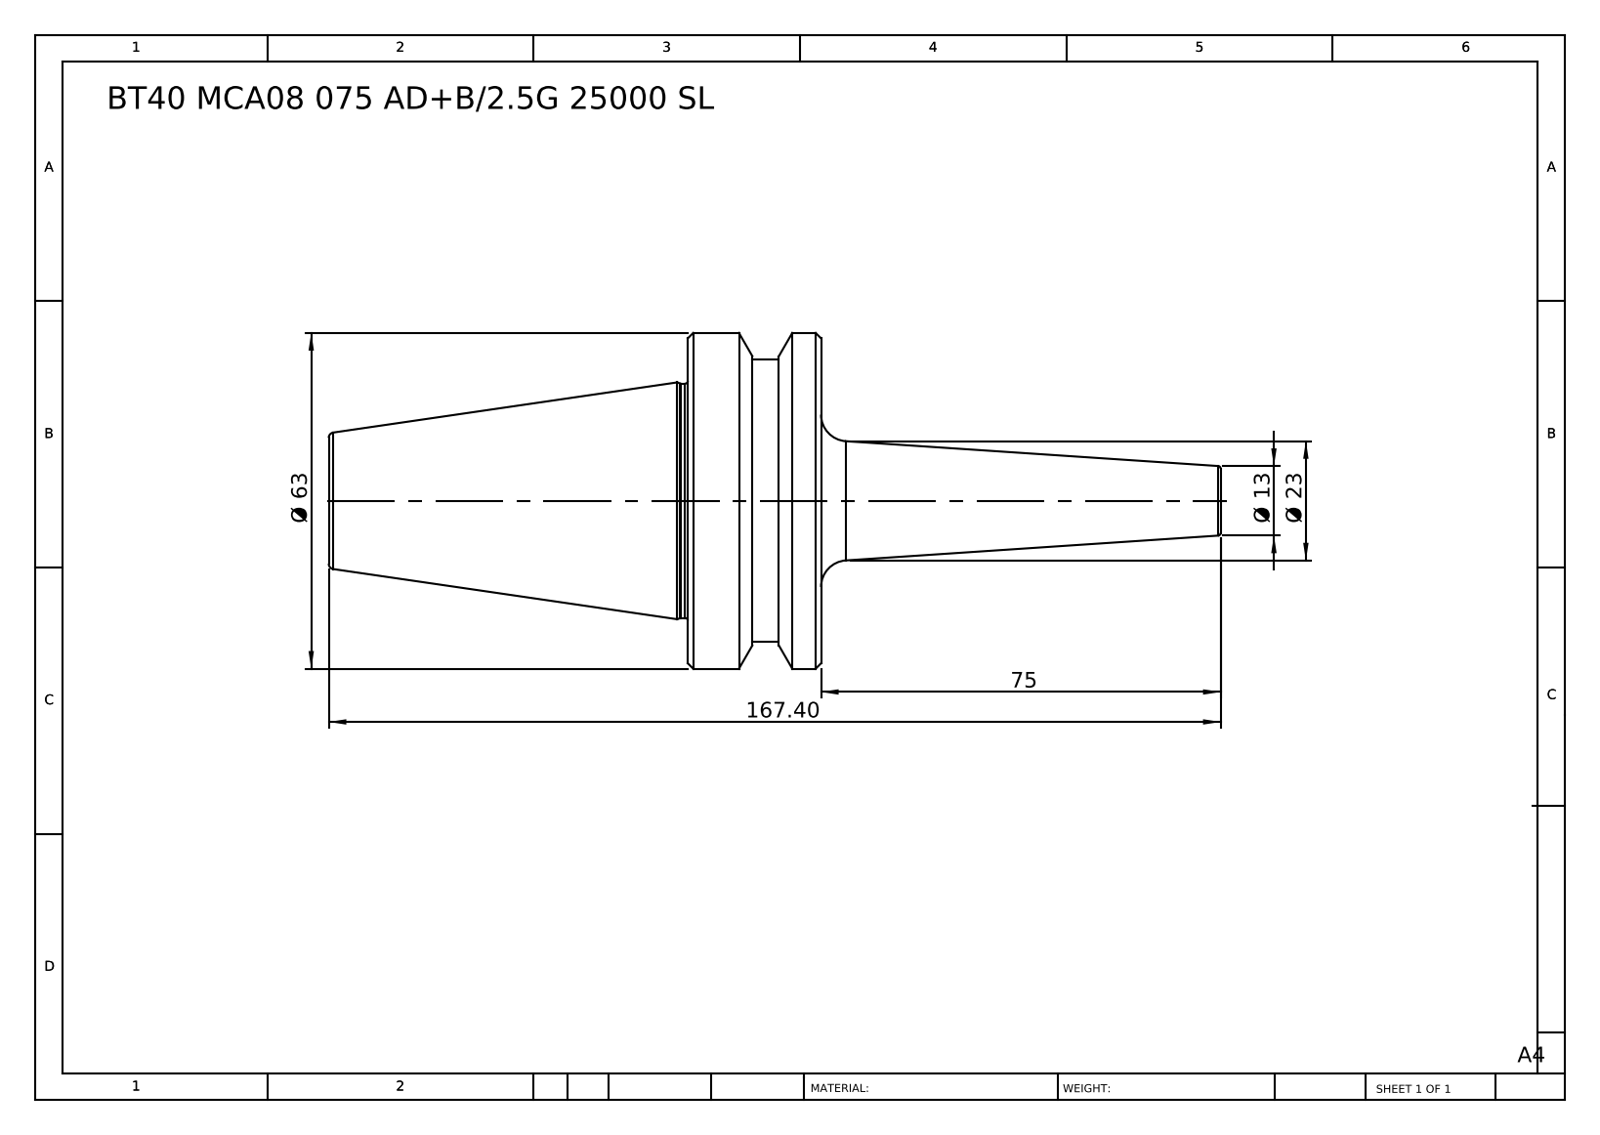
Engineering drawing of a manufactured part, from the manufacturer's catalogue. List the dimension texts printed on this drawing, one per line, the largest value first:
167.40
75
Ø 63
Ø 23
Ø 13
